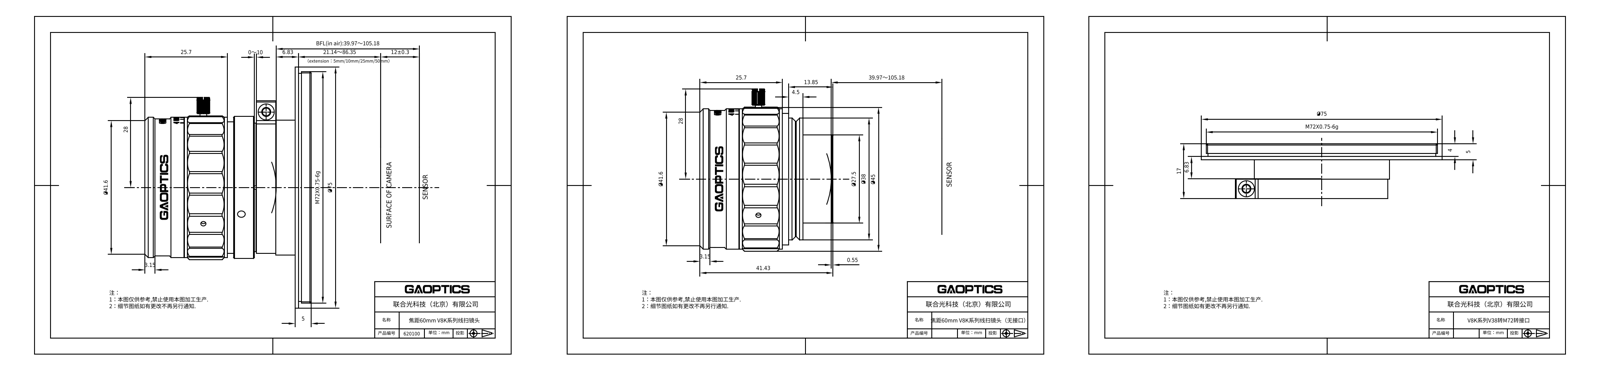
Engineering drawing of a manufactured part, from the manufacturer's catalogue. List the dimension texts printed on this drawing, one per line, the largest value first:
Ø75
Ø75
M72X0.75-6g
M72X0.75-6g
Ø45
Ø41.6
Ø41.6
41.43
39.97～105.18
BFL(in air):39.97～105.18
Ø38
28
28
Ø27.5
25.7
25.7
21.14～86.35
17
13.85
12±0.3
6.83
6.83
5
5
4.5
4
3.15
3.15
0.55
0～10
